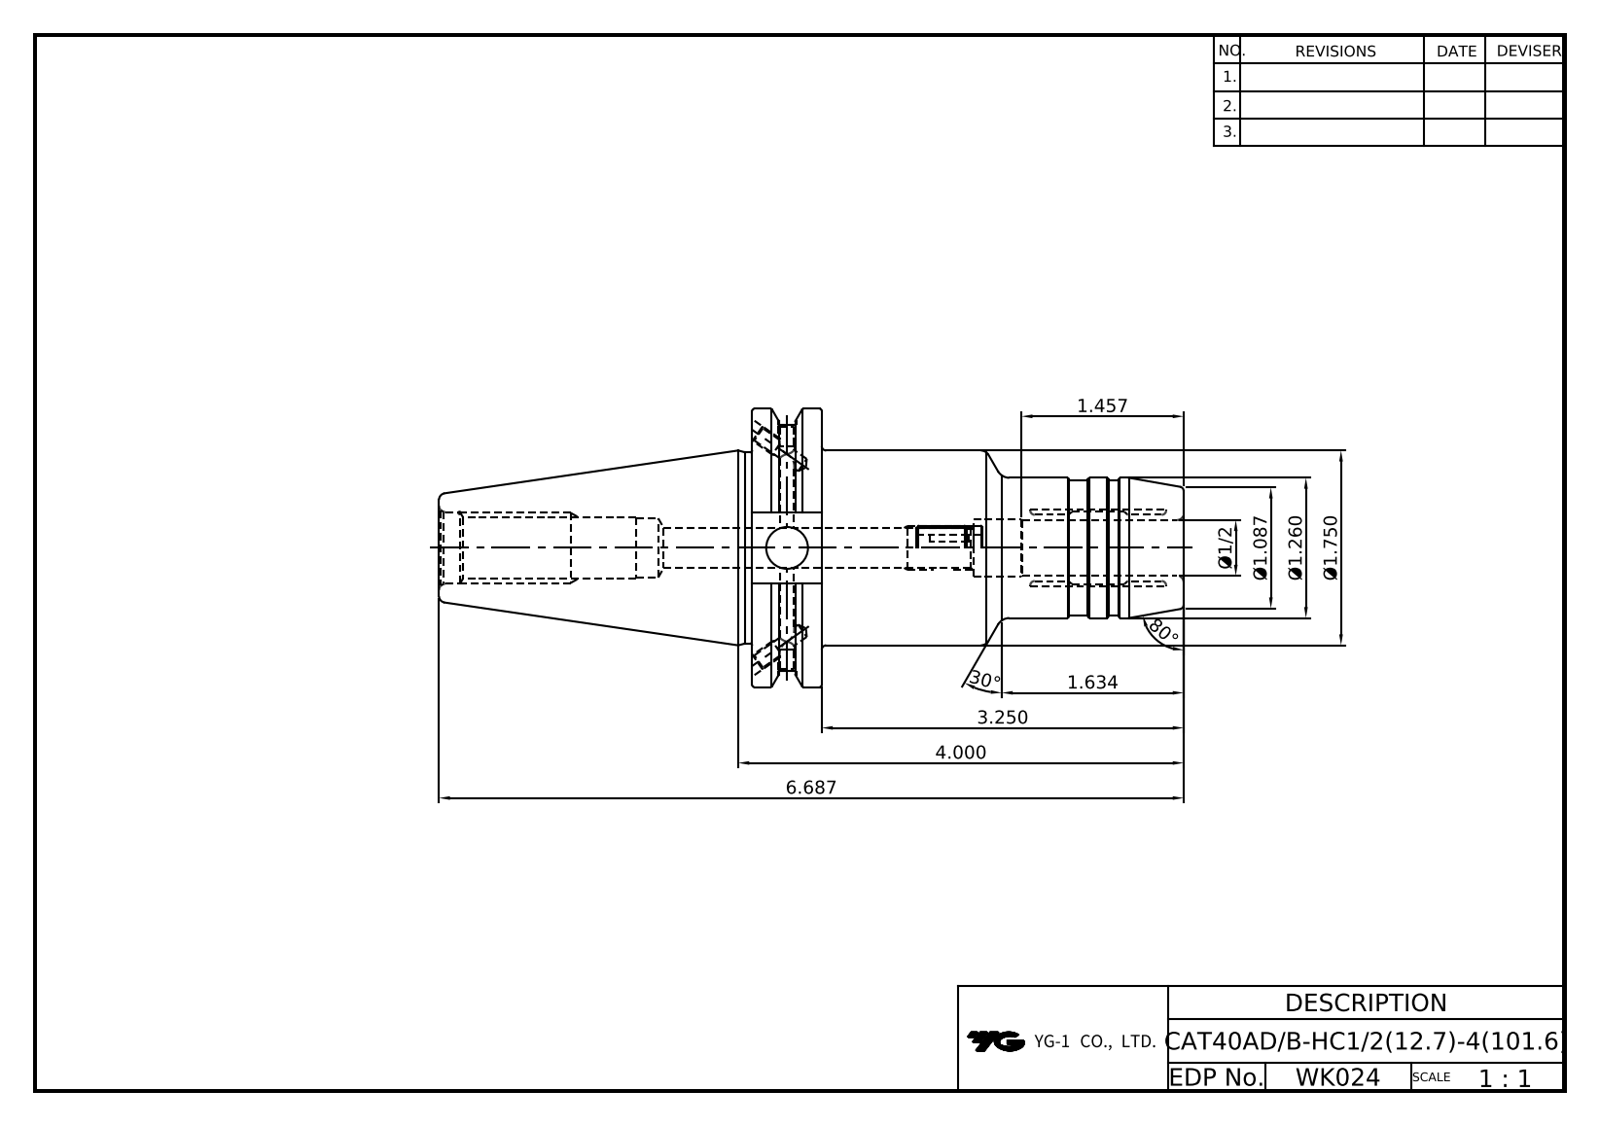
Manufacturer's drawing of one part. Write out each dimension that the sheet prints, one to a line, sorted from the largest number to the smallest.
80°
30°
6.687
4.000
3.250
Ø1.750
1.634
1.457
Ø1.260
Ø1.087
Ø1/2
